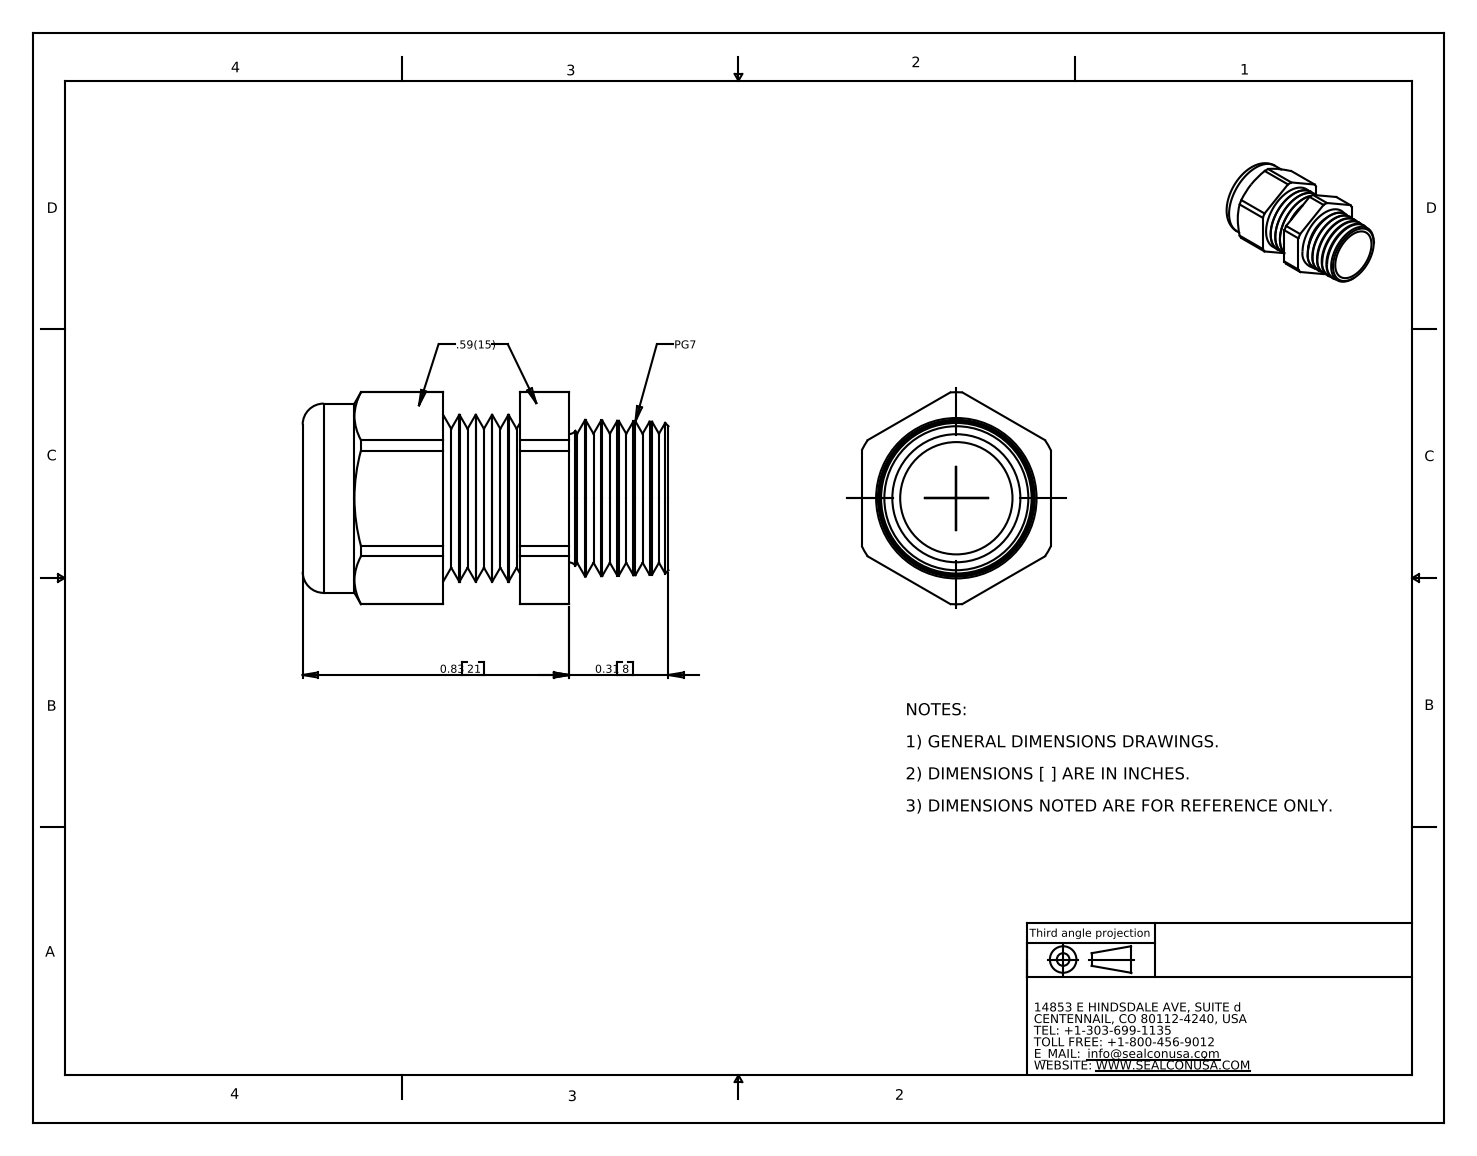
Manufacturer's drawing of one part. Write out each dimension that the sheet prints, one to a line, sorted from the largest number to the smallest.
0.83 21
0.31 8
